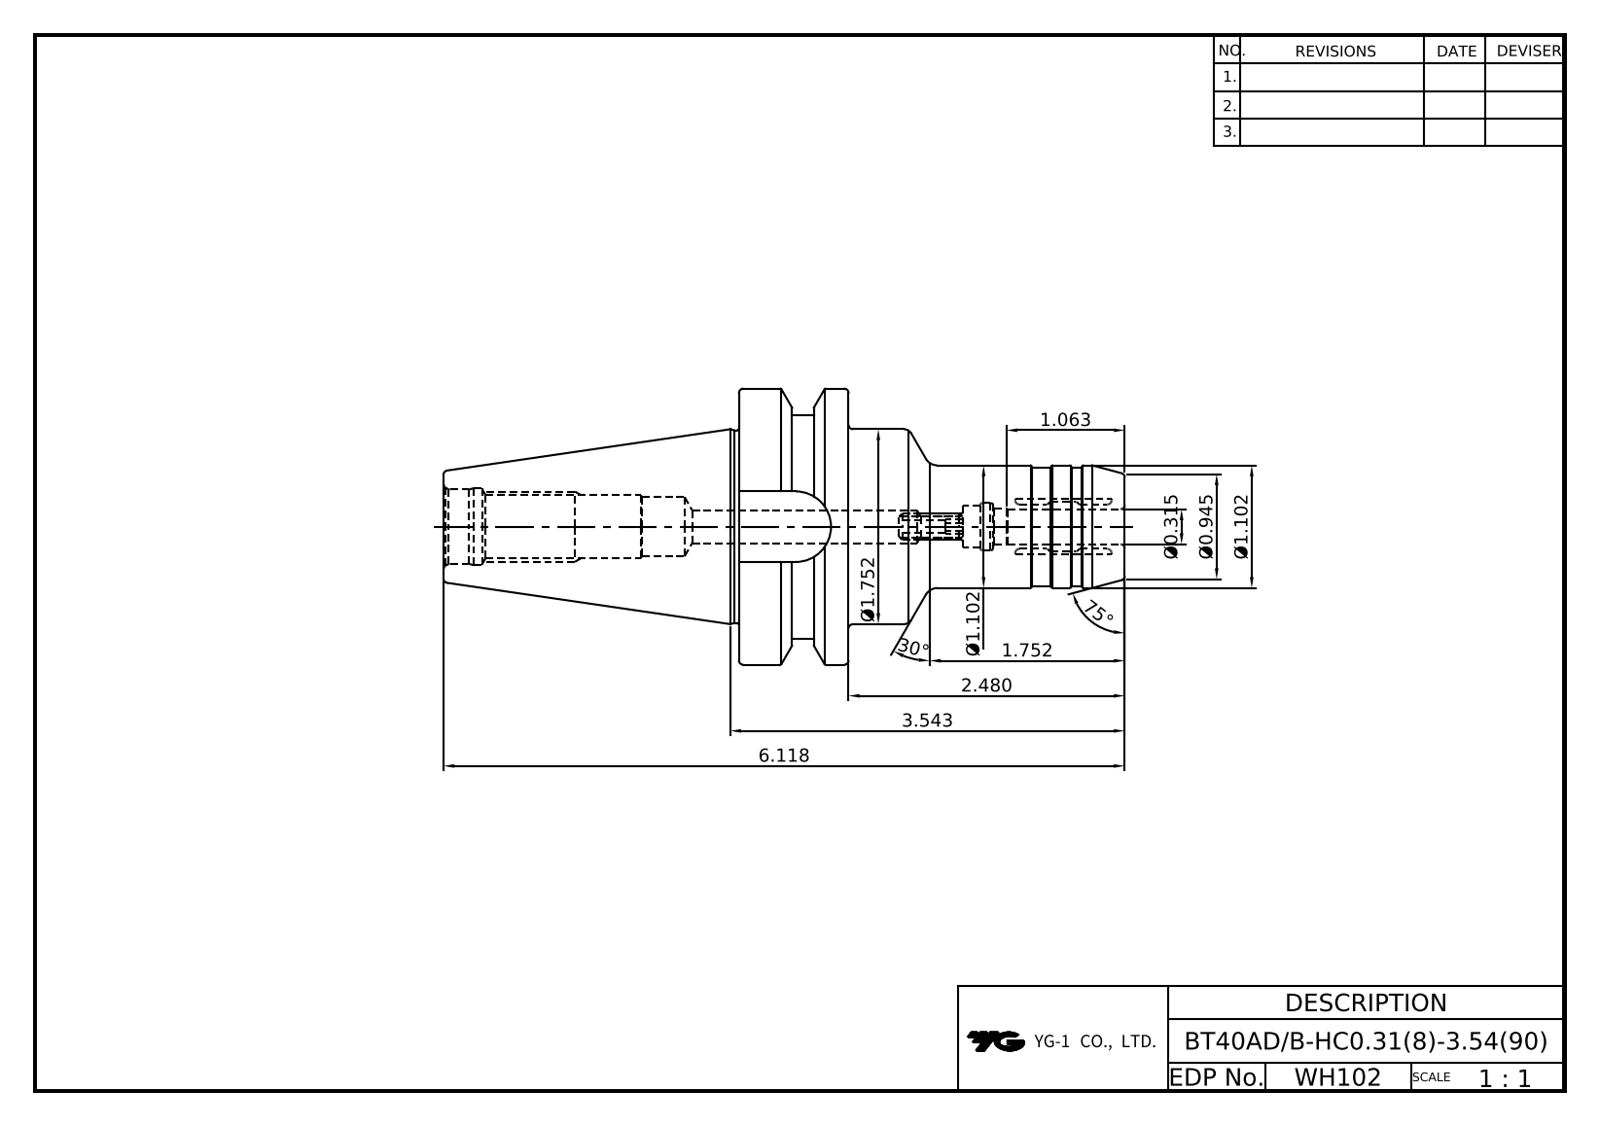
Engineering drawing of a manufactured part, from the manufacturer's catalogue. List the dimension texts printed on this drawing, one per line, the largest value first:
75°
30°
6.118
3.543
2.480
1.752
Ø1.752
Ø1.102
Ø1.102
1.063
Ø0.945
Ø0.315
